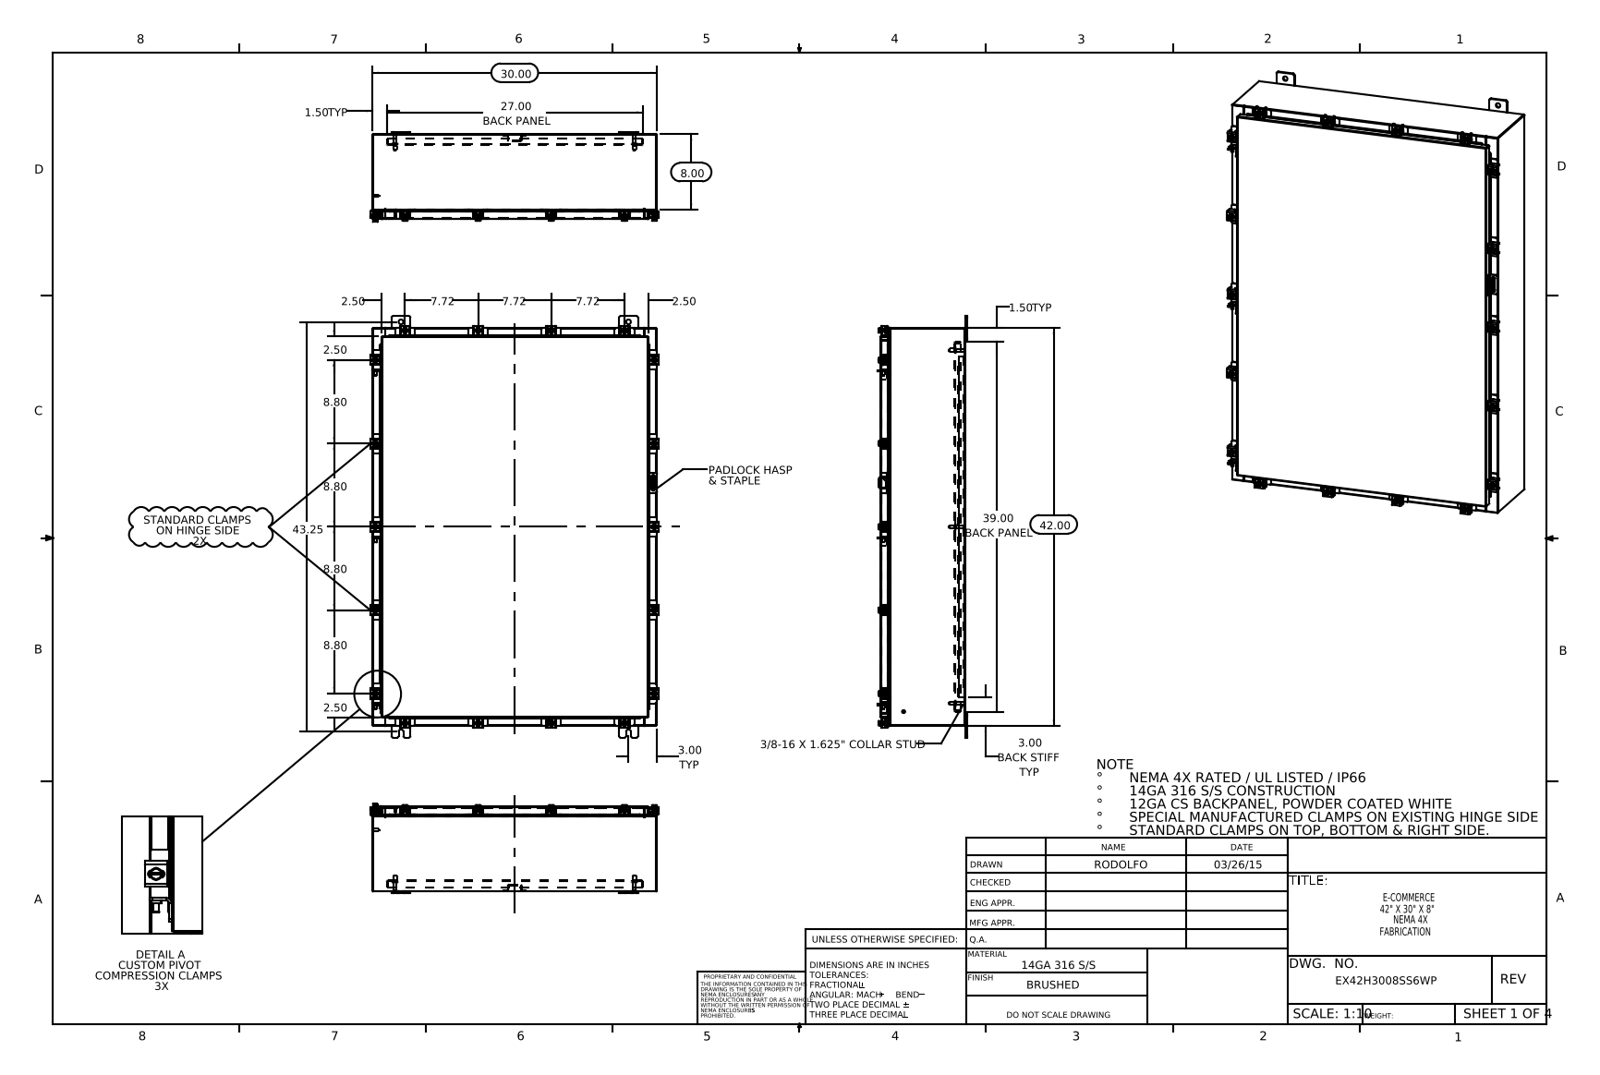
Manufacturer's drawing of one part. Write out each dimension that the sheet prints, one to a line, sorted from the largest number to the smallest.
43.25
42.00
39.00 BACK PANEL
30.00
27.00 BACK PANEL
8.80
8.80
8.80
8.80
8.00
7.72
7.72
7.72
3.00 TYP
3.00 BACK STIFF TYP
2.50
2.50
2.50
2.50
1.50 TYP
1.50 TYP
